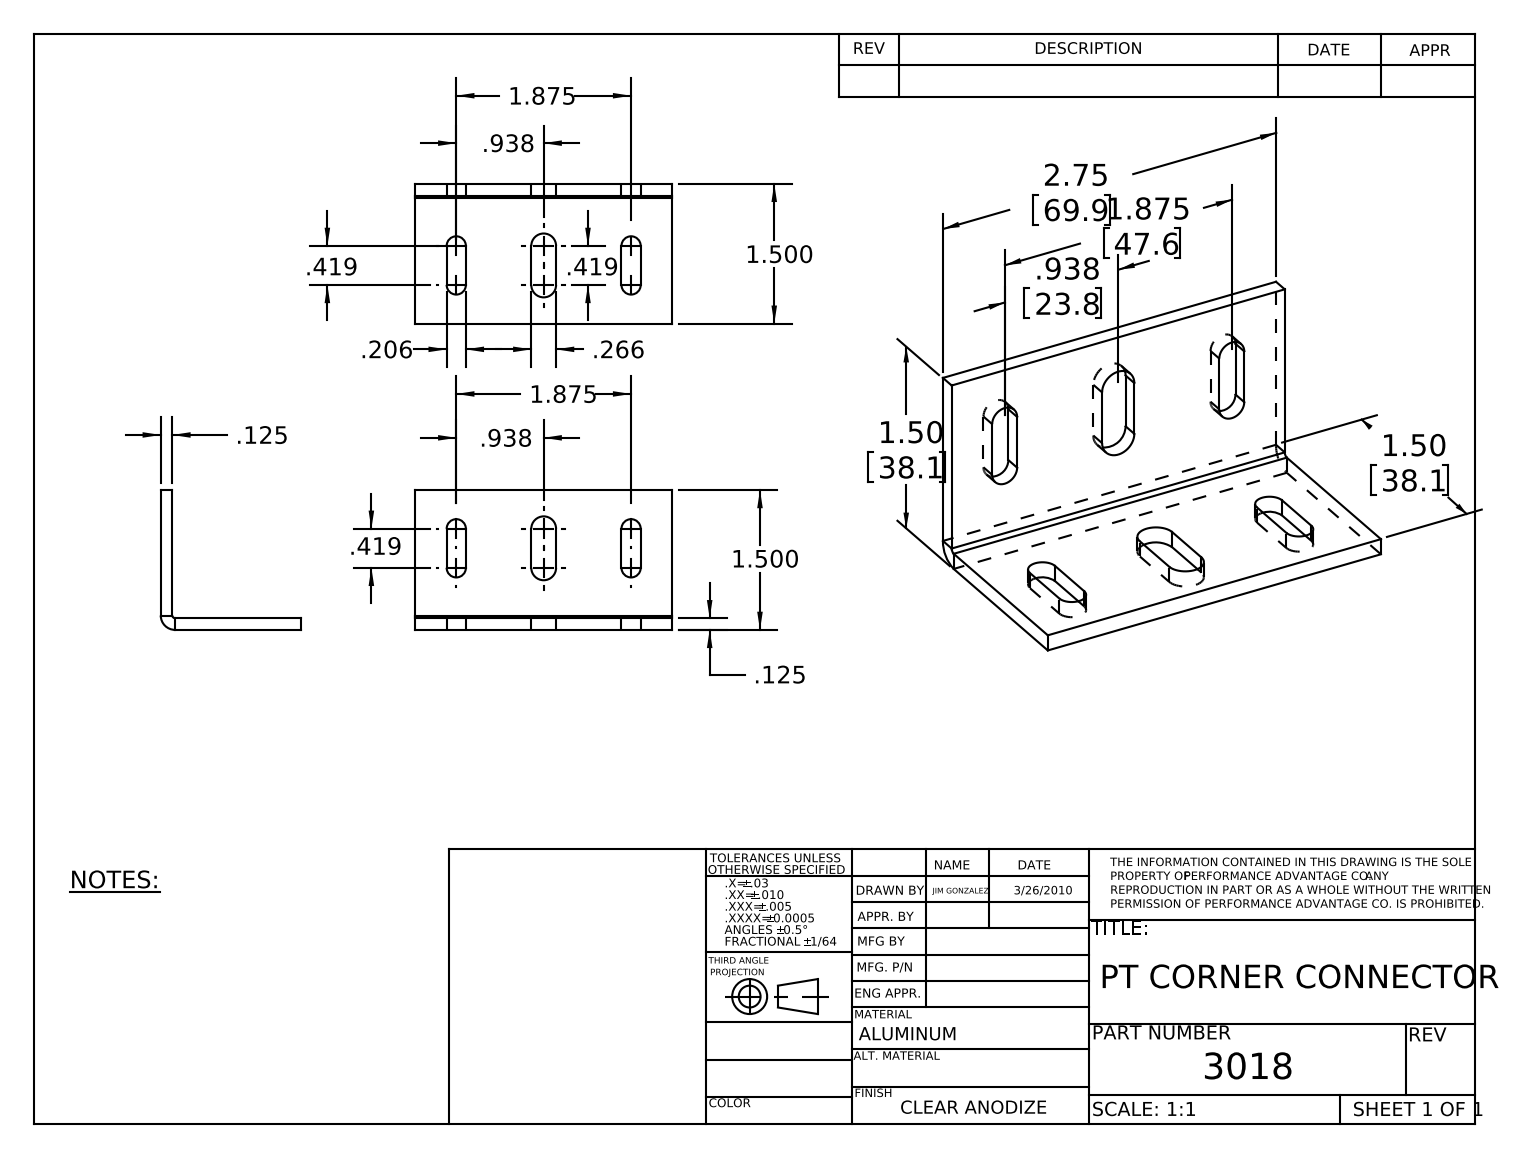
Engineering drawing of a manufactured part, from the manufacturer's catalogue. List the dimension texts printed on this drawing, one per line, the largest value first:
2.75 69.9
1.875 47.6
1.875
1.875
1.50 38.1
1.50 38.1
1.500
1.500
.938 23.8
.938
.938
.419
.419
.419
.266
.206
.125
.125
